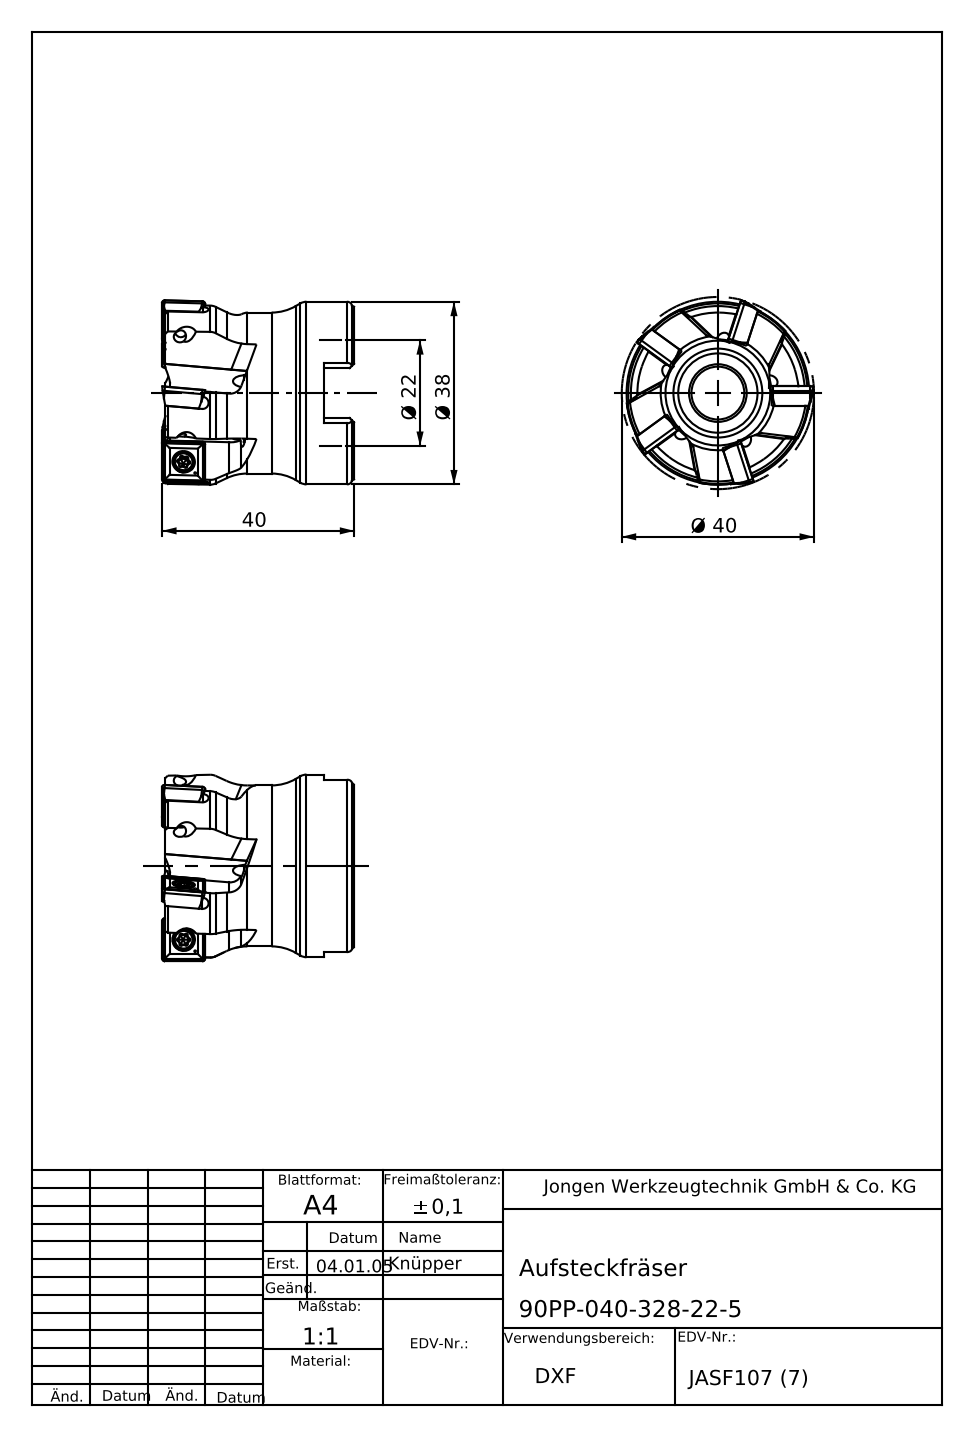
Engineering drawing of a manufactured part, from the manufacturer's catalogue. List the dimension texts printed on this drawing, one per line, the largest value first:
40
Ø 40
Ø 38
Ø 22
